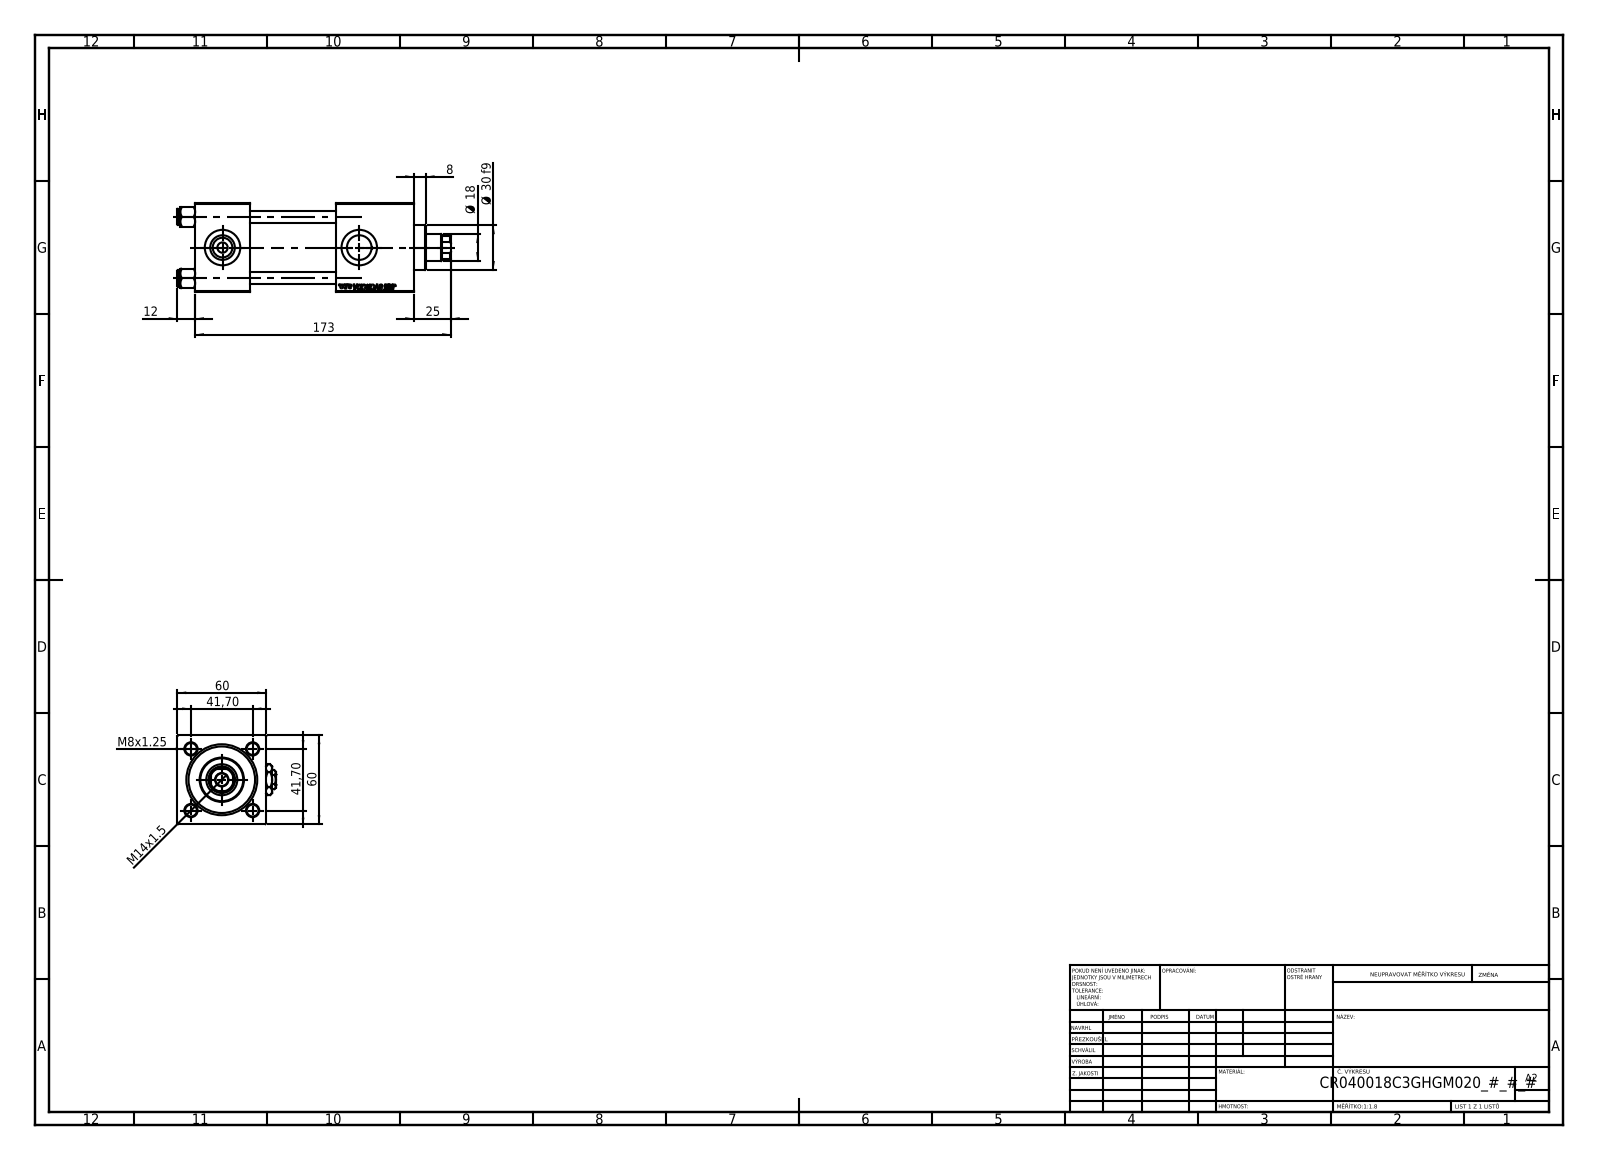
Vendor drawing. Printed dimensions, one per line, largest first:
173
60
60
41,70
41,70
Ø 30 f9
25
Ø 18
M14x1.5
12
8
M8x1.25
